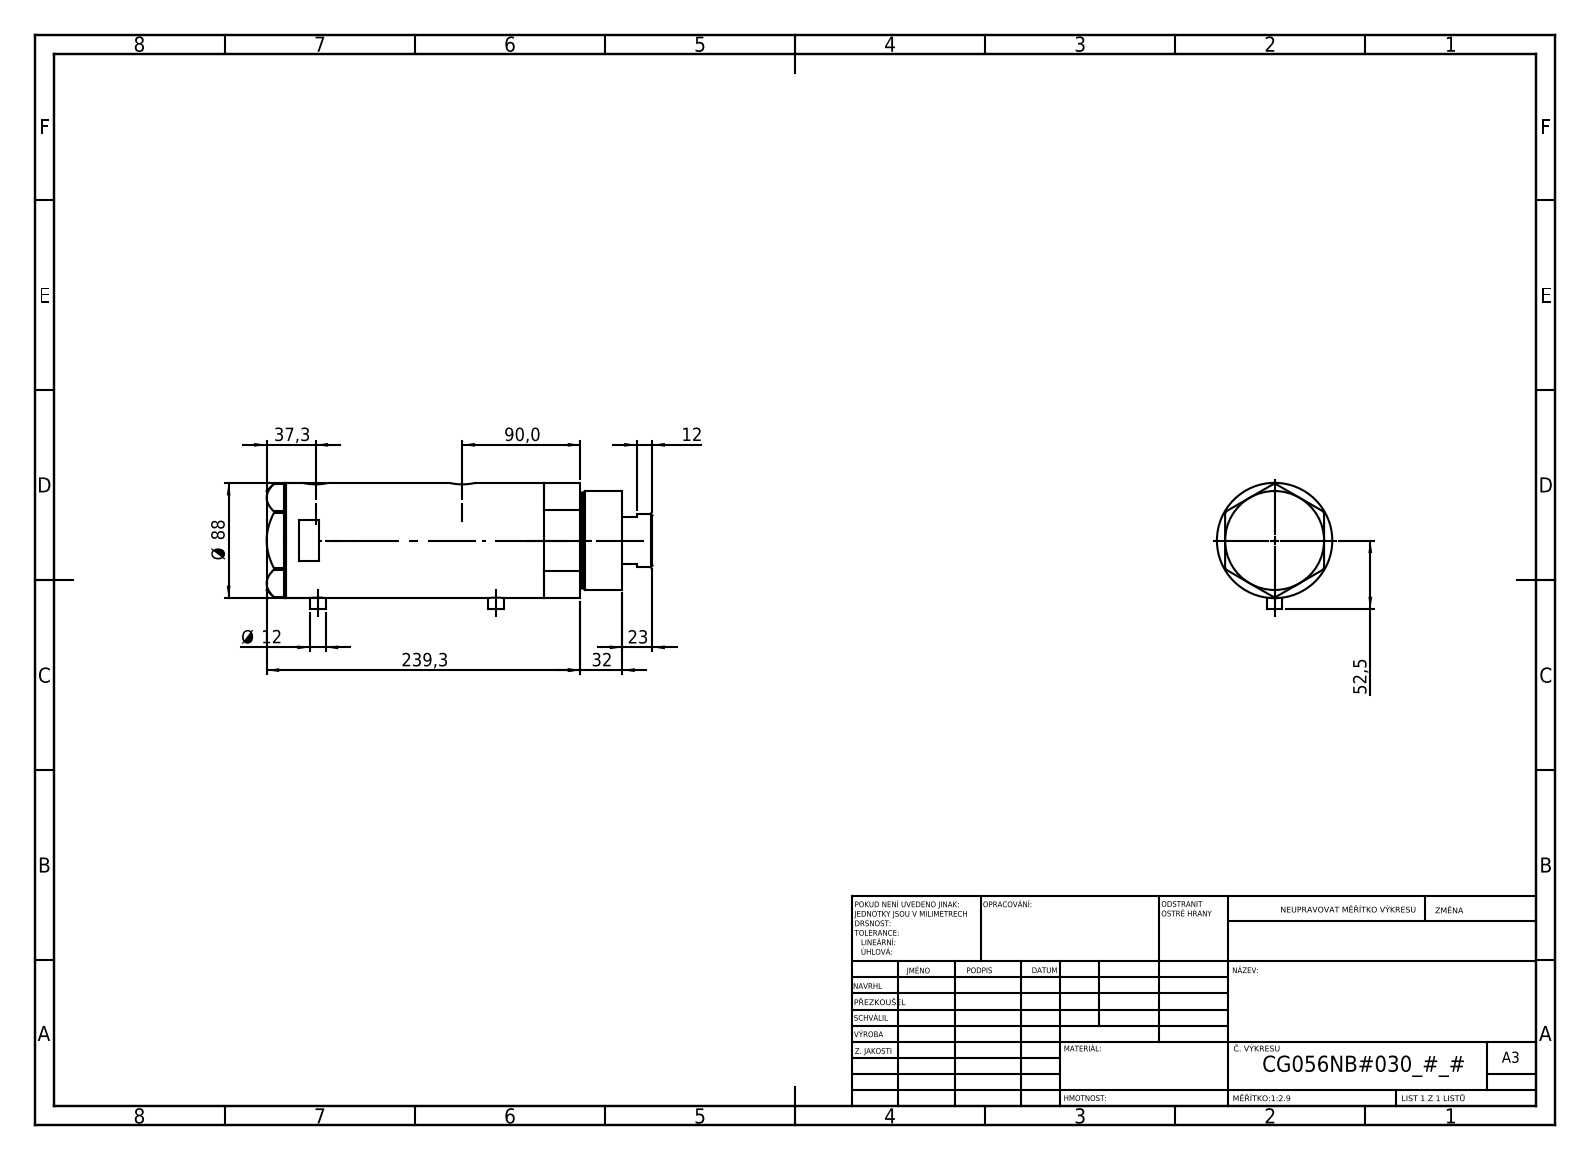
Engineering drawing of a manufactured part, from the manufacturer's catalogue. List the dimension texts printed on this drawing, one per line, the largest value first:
239,3
90,0
Ø 88
52,5
37,3
32
23
12
Ø 12
